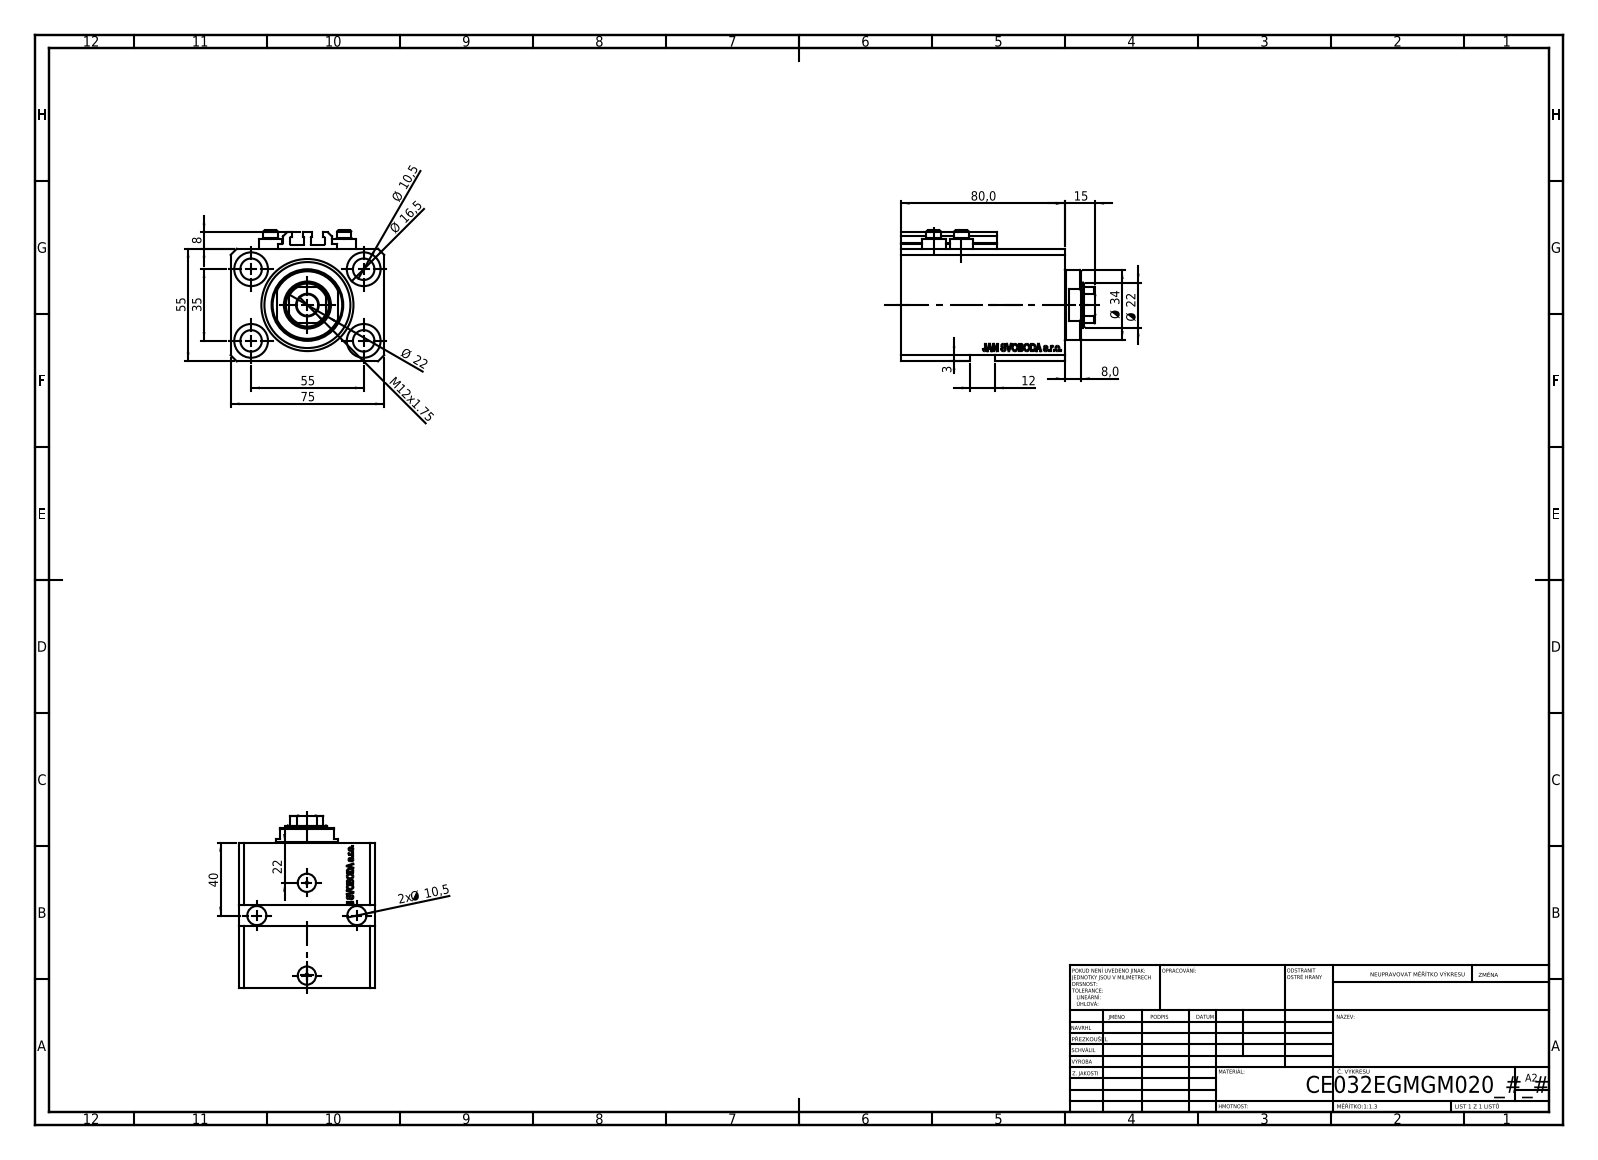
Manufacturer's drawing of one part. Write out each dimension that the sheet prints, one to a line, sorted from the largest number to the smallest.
80,0
75
55
55
40
35
Ø 34
Ø 22
Ø 22
22
Ø 16,5
15
M12x1.75
12
Ø 10,5
2x Ø 10,5
8
8,0
3
